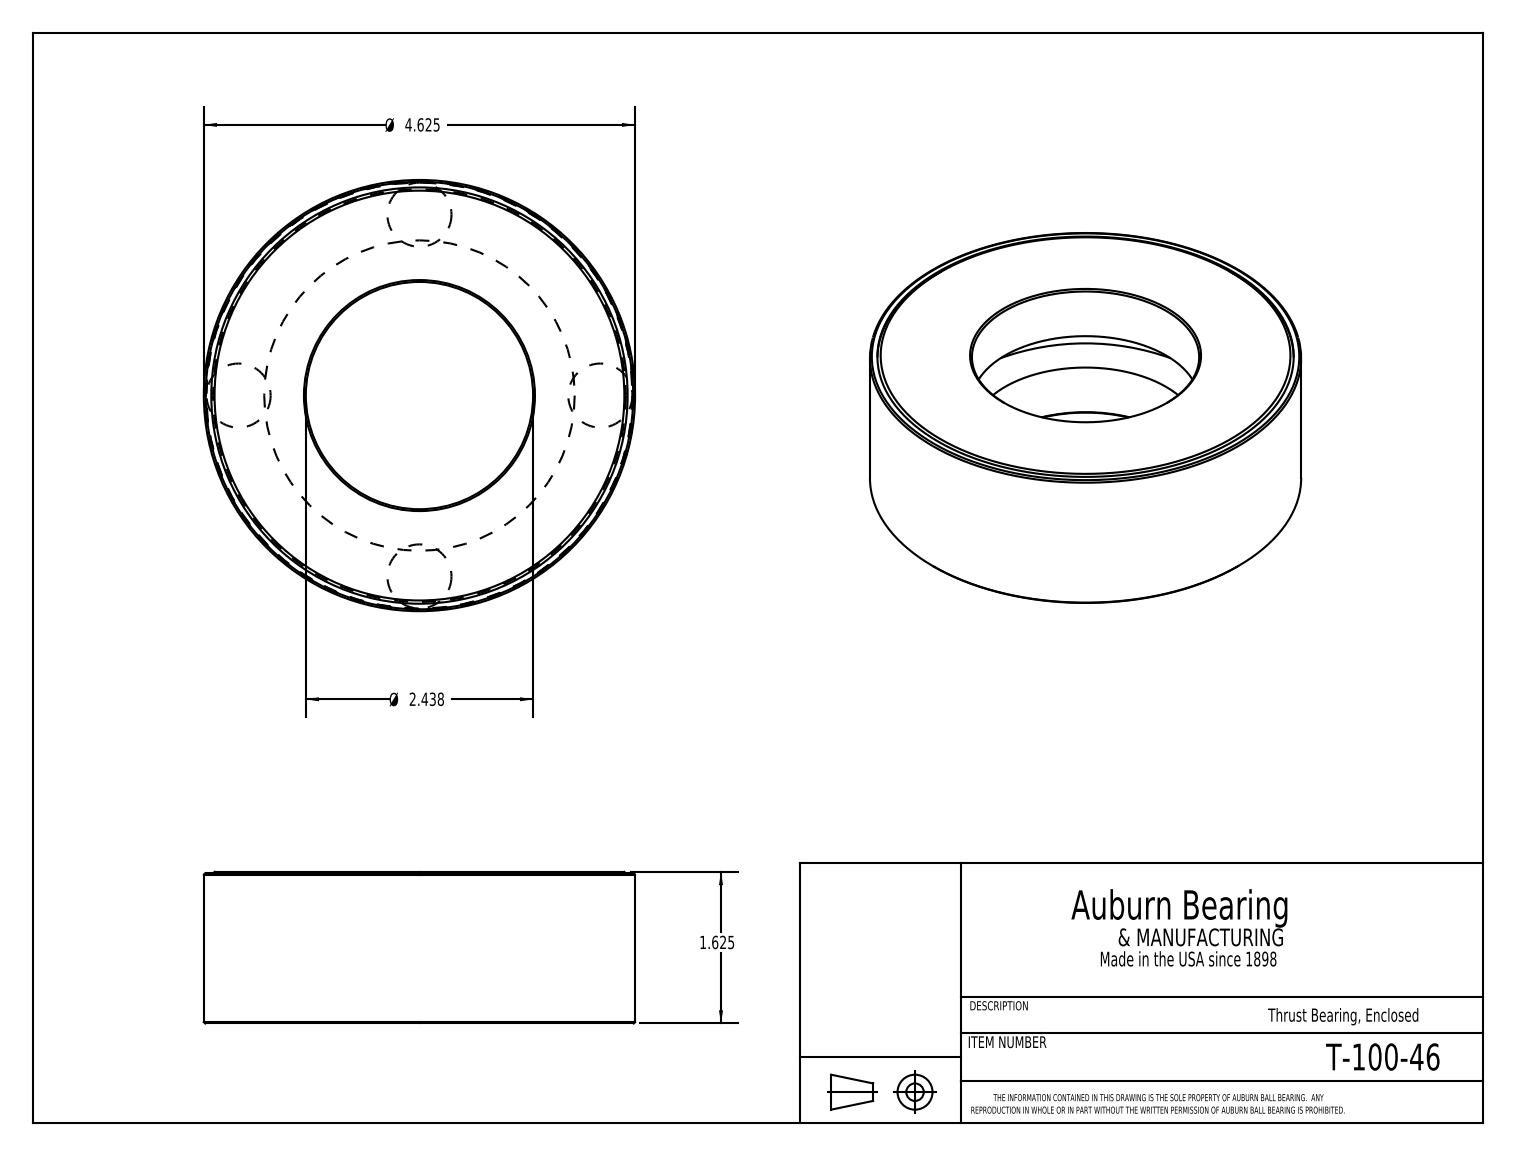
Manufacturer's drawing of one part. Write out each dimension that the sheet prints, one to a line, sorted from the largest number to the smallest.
Ø 4.625
Ø 2.438
1.625
